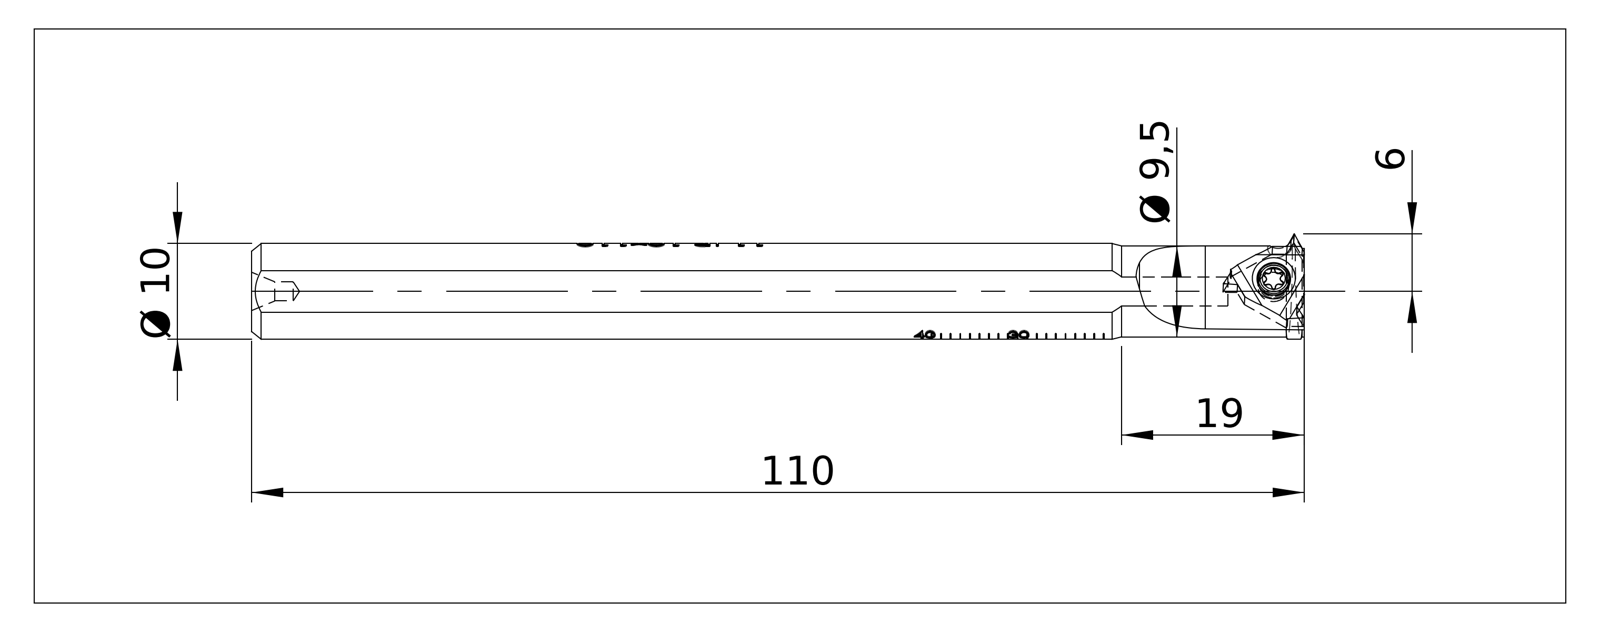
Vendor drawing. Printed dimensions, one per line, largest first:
110
19
Ø 10
Ø 9,5
6
